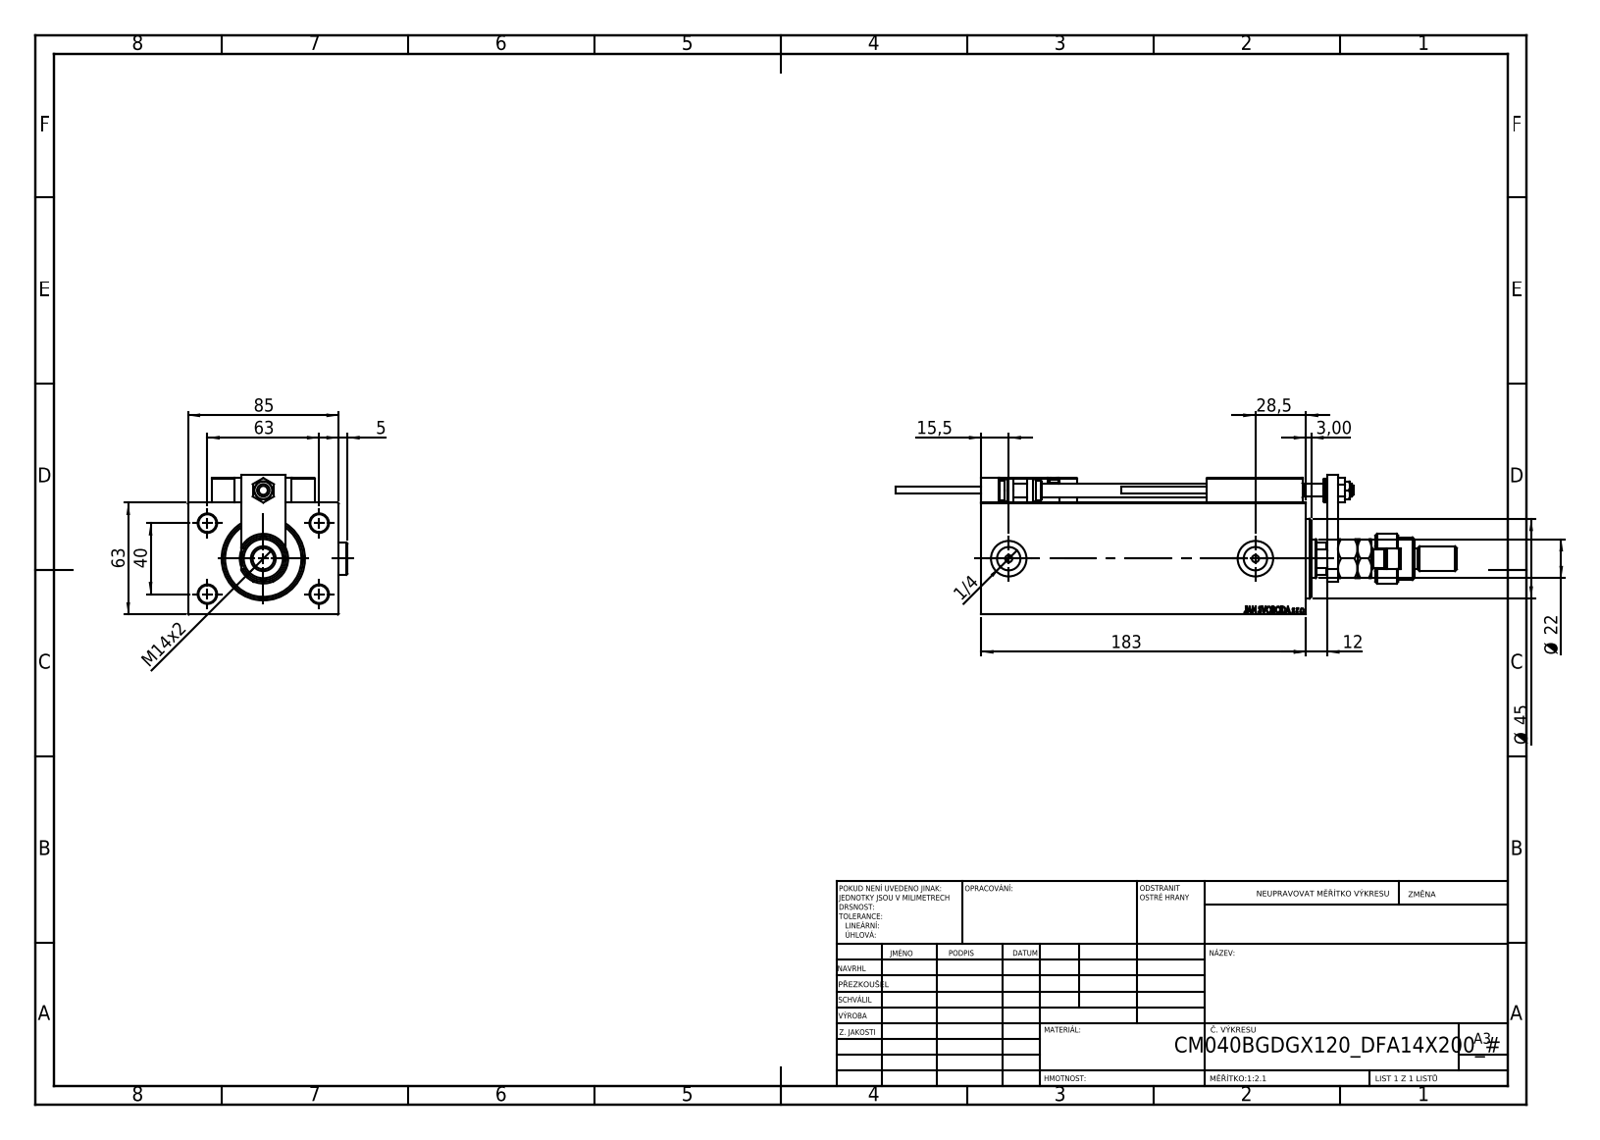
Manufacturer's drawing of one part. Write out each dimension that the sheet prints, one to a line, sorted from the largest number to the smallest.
183
85
63
63
Ø 45
40
28,5
Ø 22
15,5
M14x2
12
5
3,00
1/4
